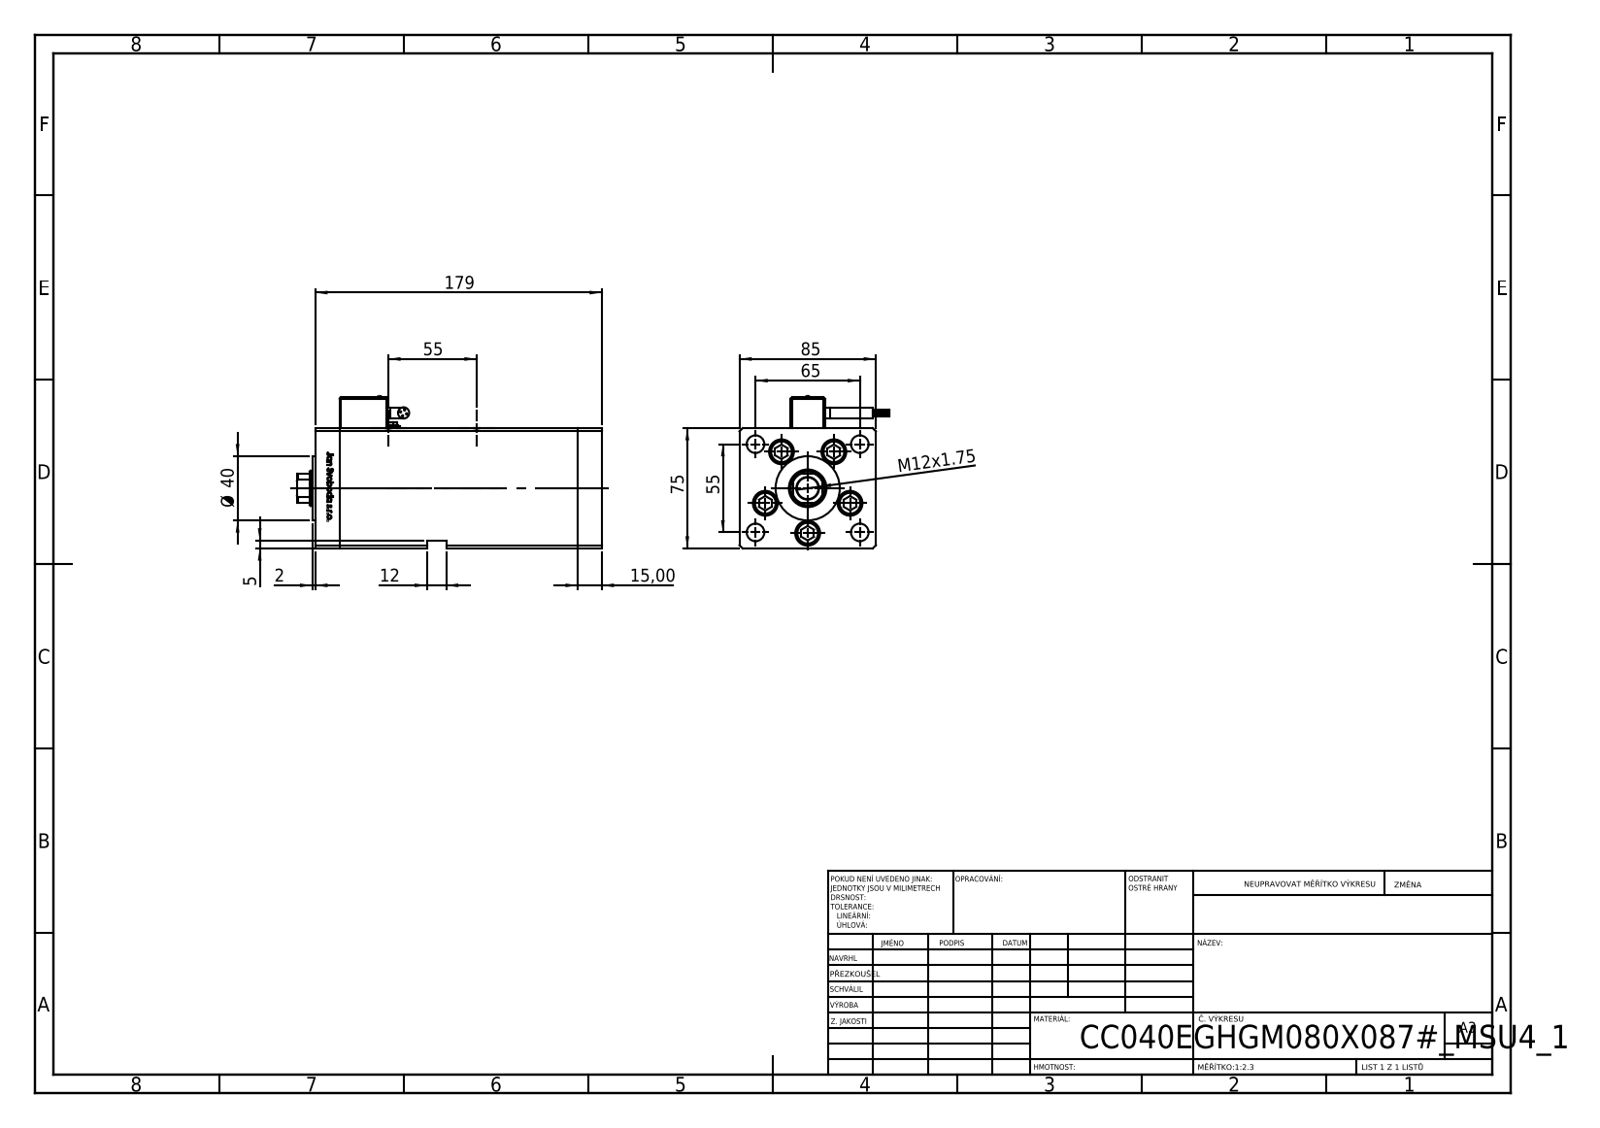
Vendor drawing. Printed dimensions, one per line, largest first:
179
85
75
65
55
55
Ø 40
15,00
12
M12x1.75
5
2
